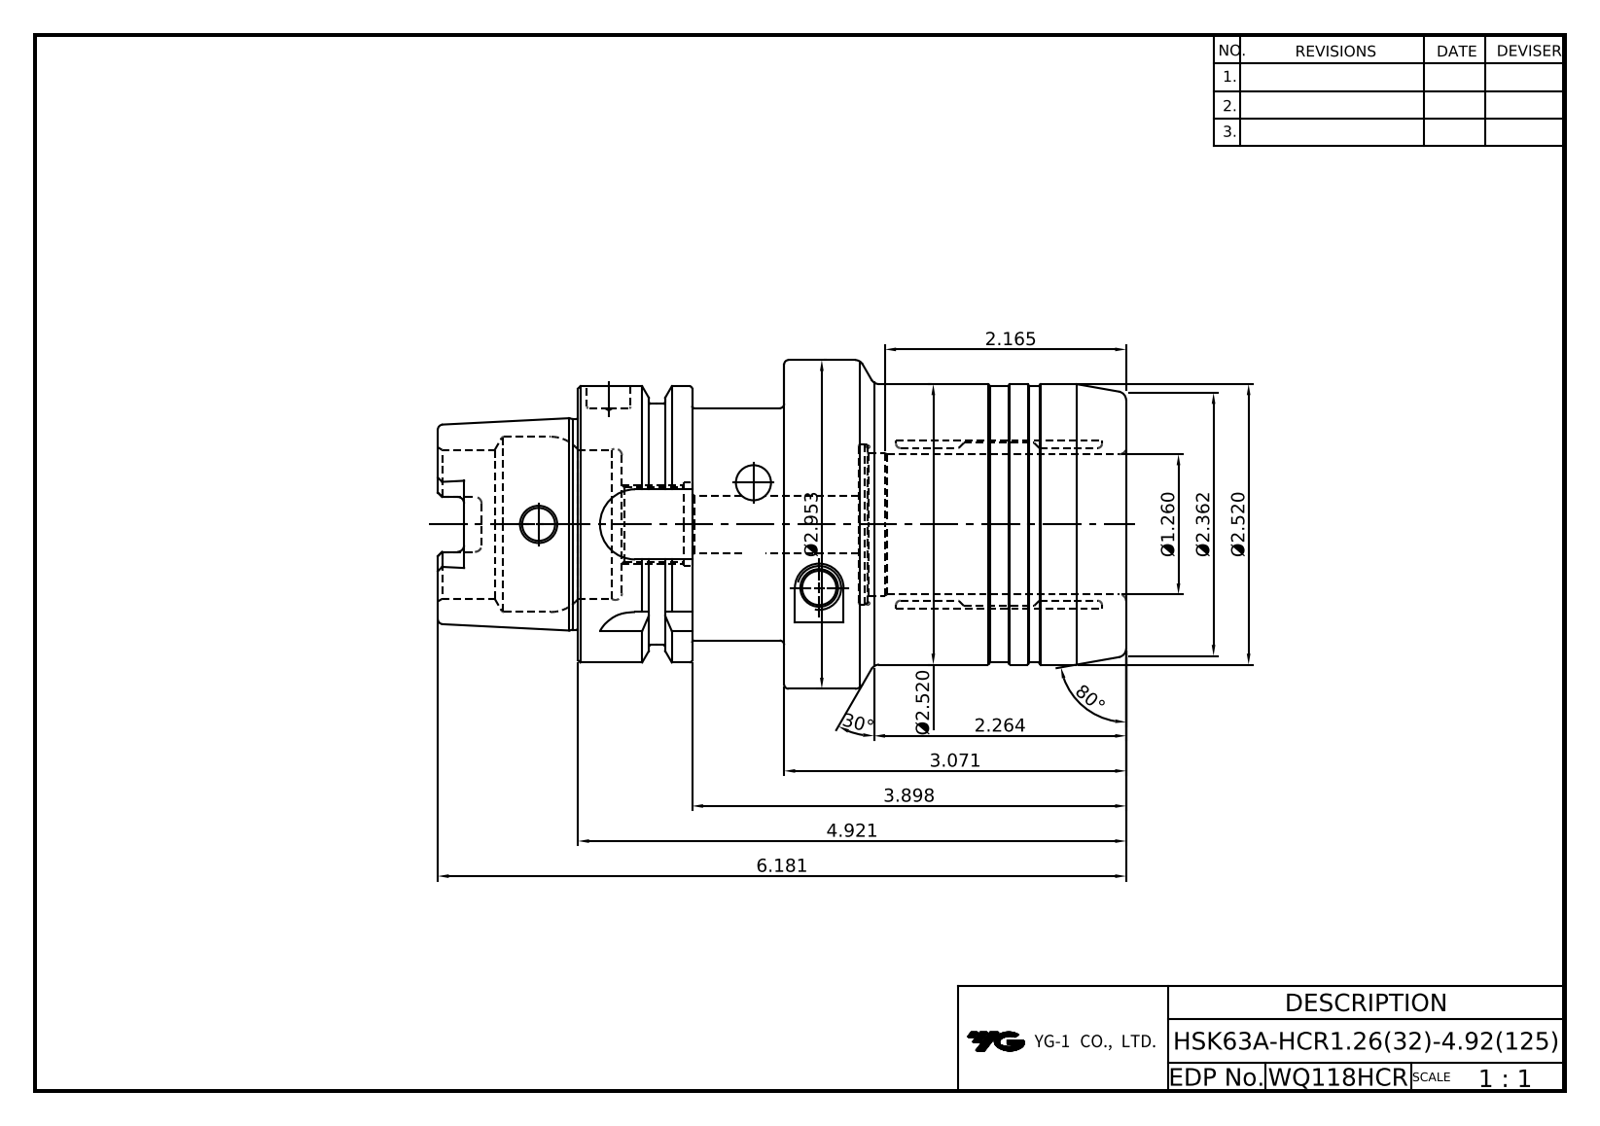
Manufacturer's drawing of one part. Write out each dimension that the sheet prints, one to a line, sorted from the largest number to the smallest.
80°
30°
6.181
4.921
3.898
3.071
Ø2.953
Ø2.520
Ø2.520
Ø2.362
2.264
2.165
Ø1.260
